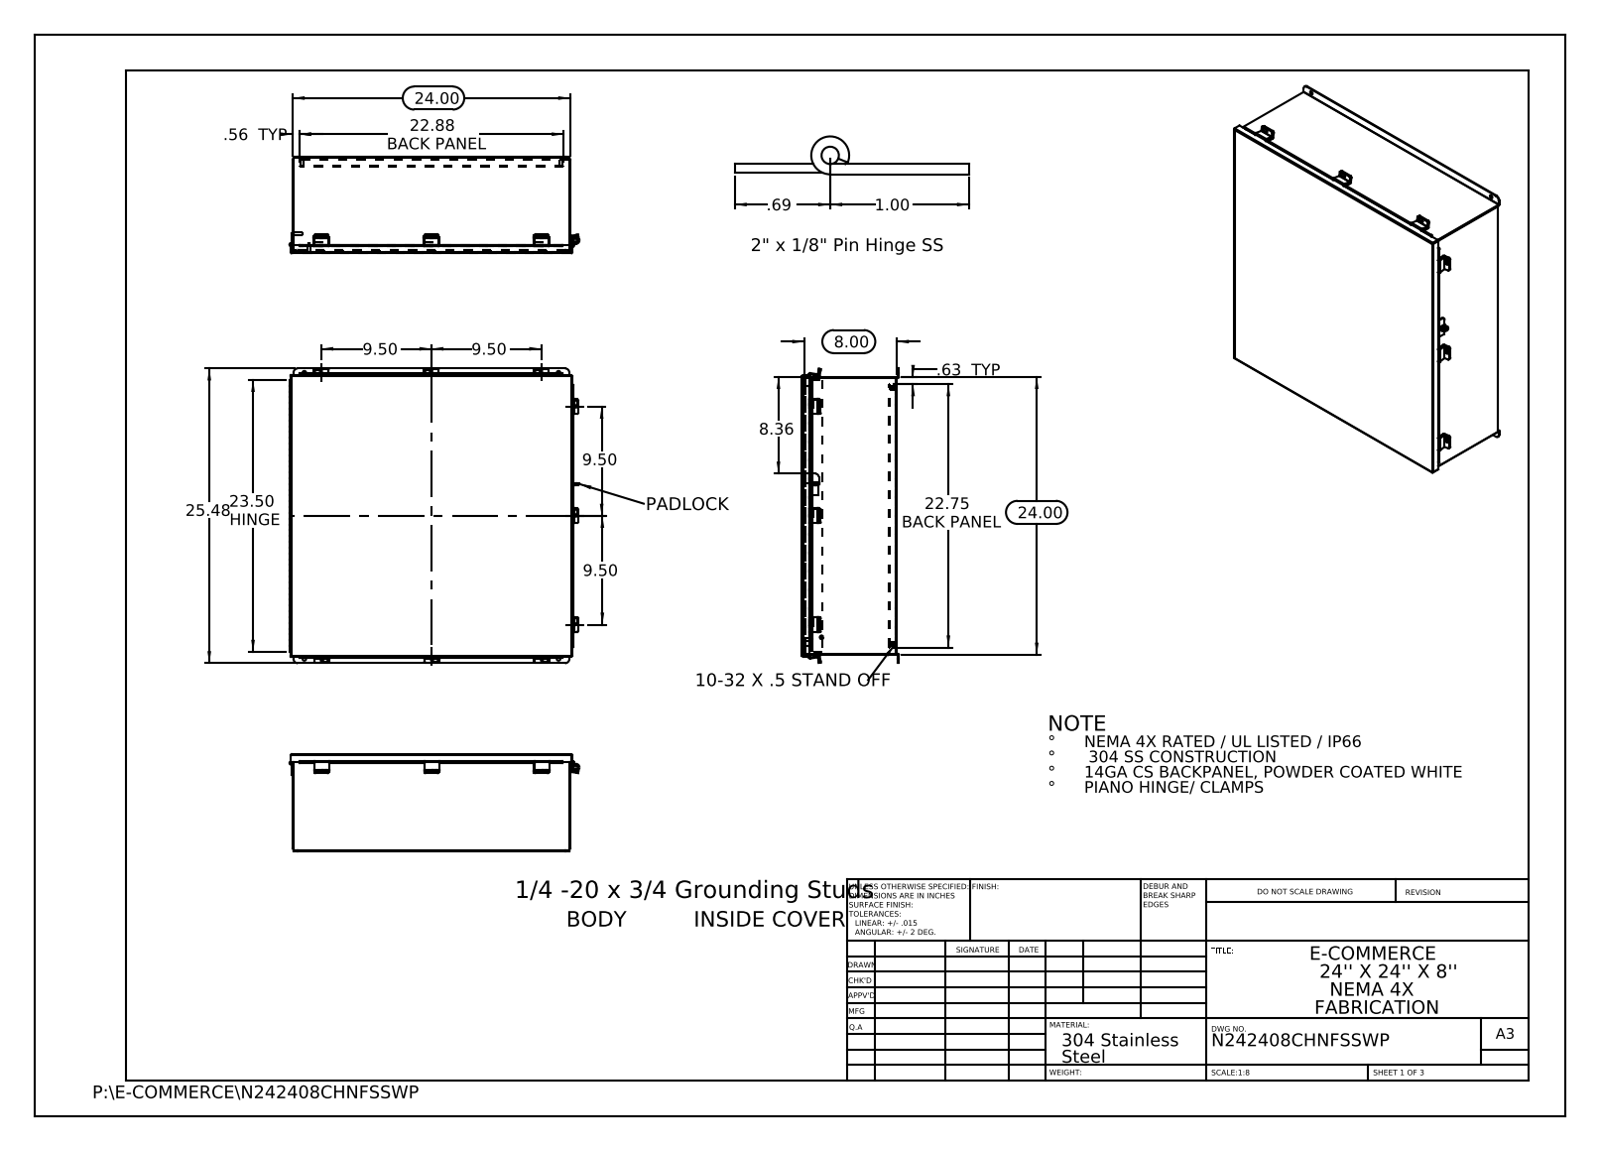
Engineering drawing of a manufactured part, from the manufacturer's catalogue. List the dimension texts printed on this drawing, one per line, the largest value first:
25.48
24.00
24.00
23.50 HINGE
22.88 BACK PANEL
22.75 BACK PANEL
9.50
9.50
9.50
9.50
8.36
8.00
1.00
.69
.63 TYP
.56 TYP
